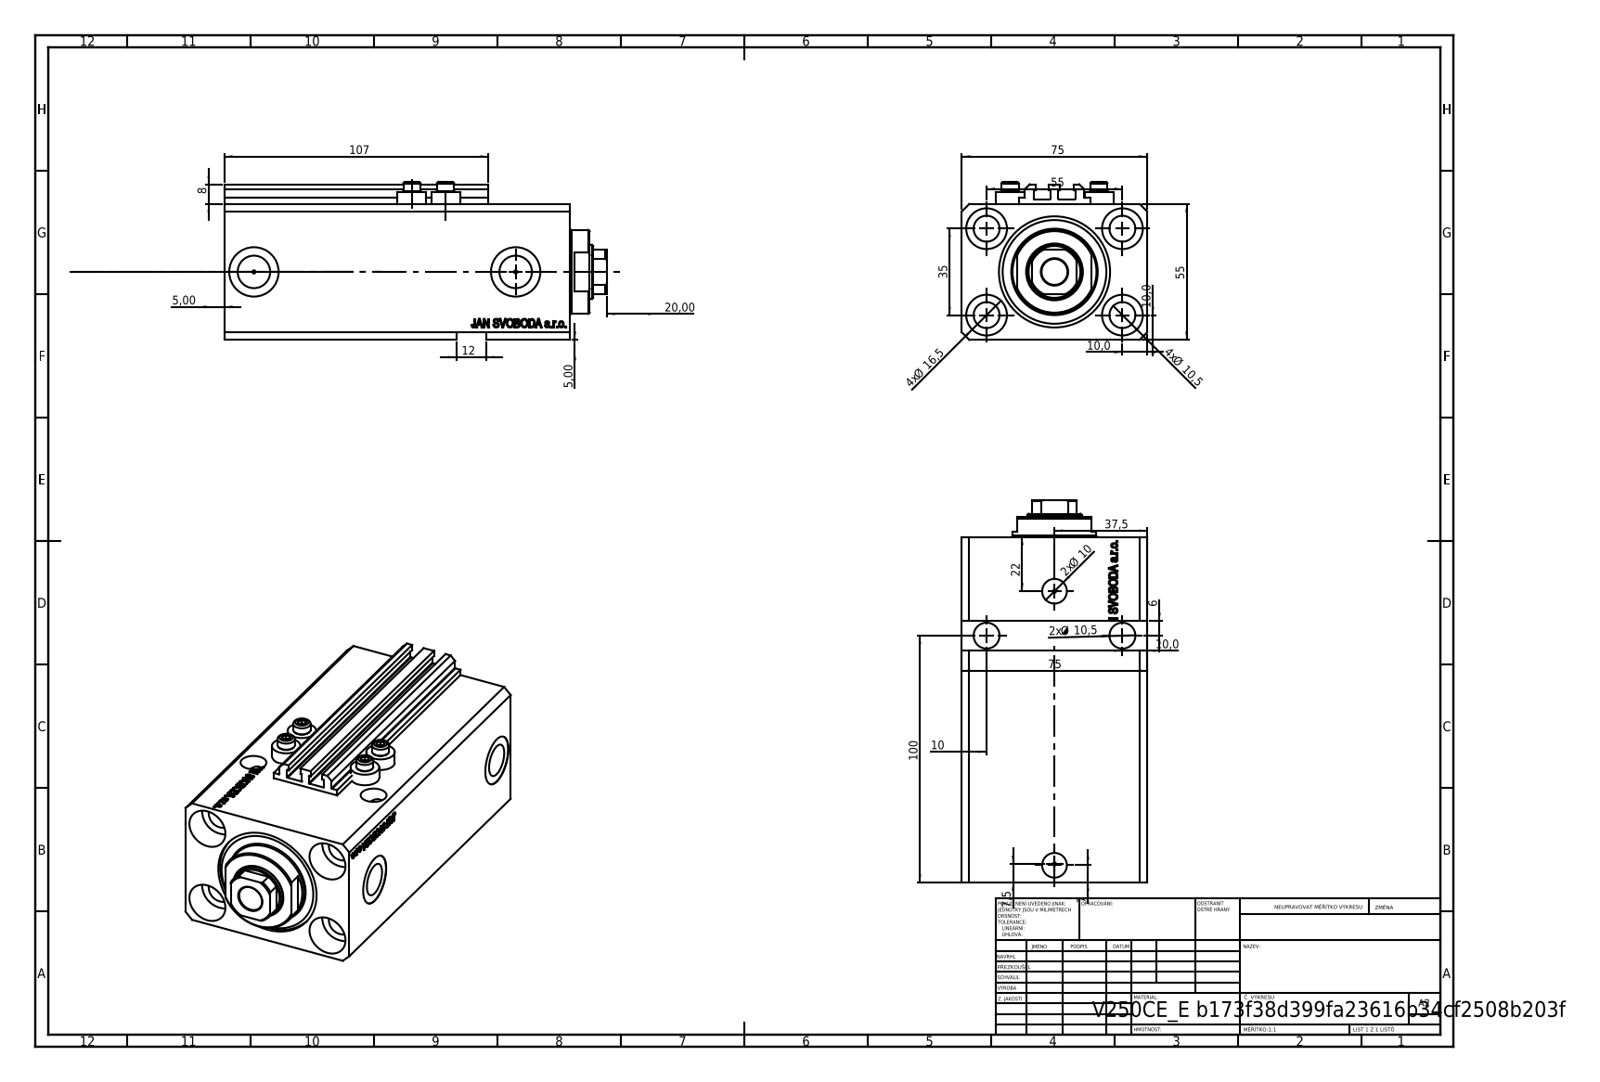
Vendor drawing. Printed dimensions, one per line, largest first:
107
100
75
75
55
55
37,5
35
22
20,00
4x Ø 16,5
12
4x Ø 10,5
2x Ø 10,5
10,0
10,0
2x Ø 10
10,0
10
8
7,5
7
6
5,00
5,00
